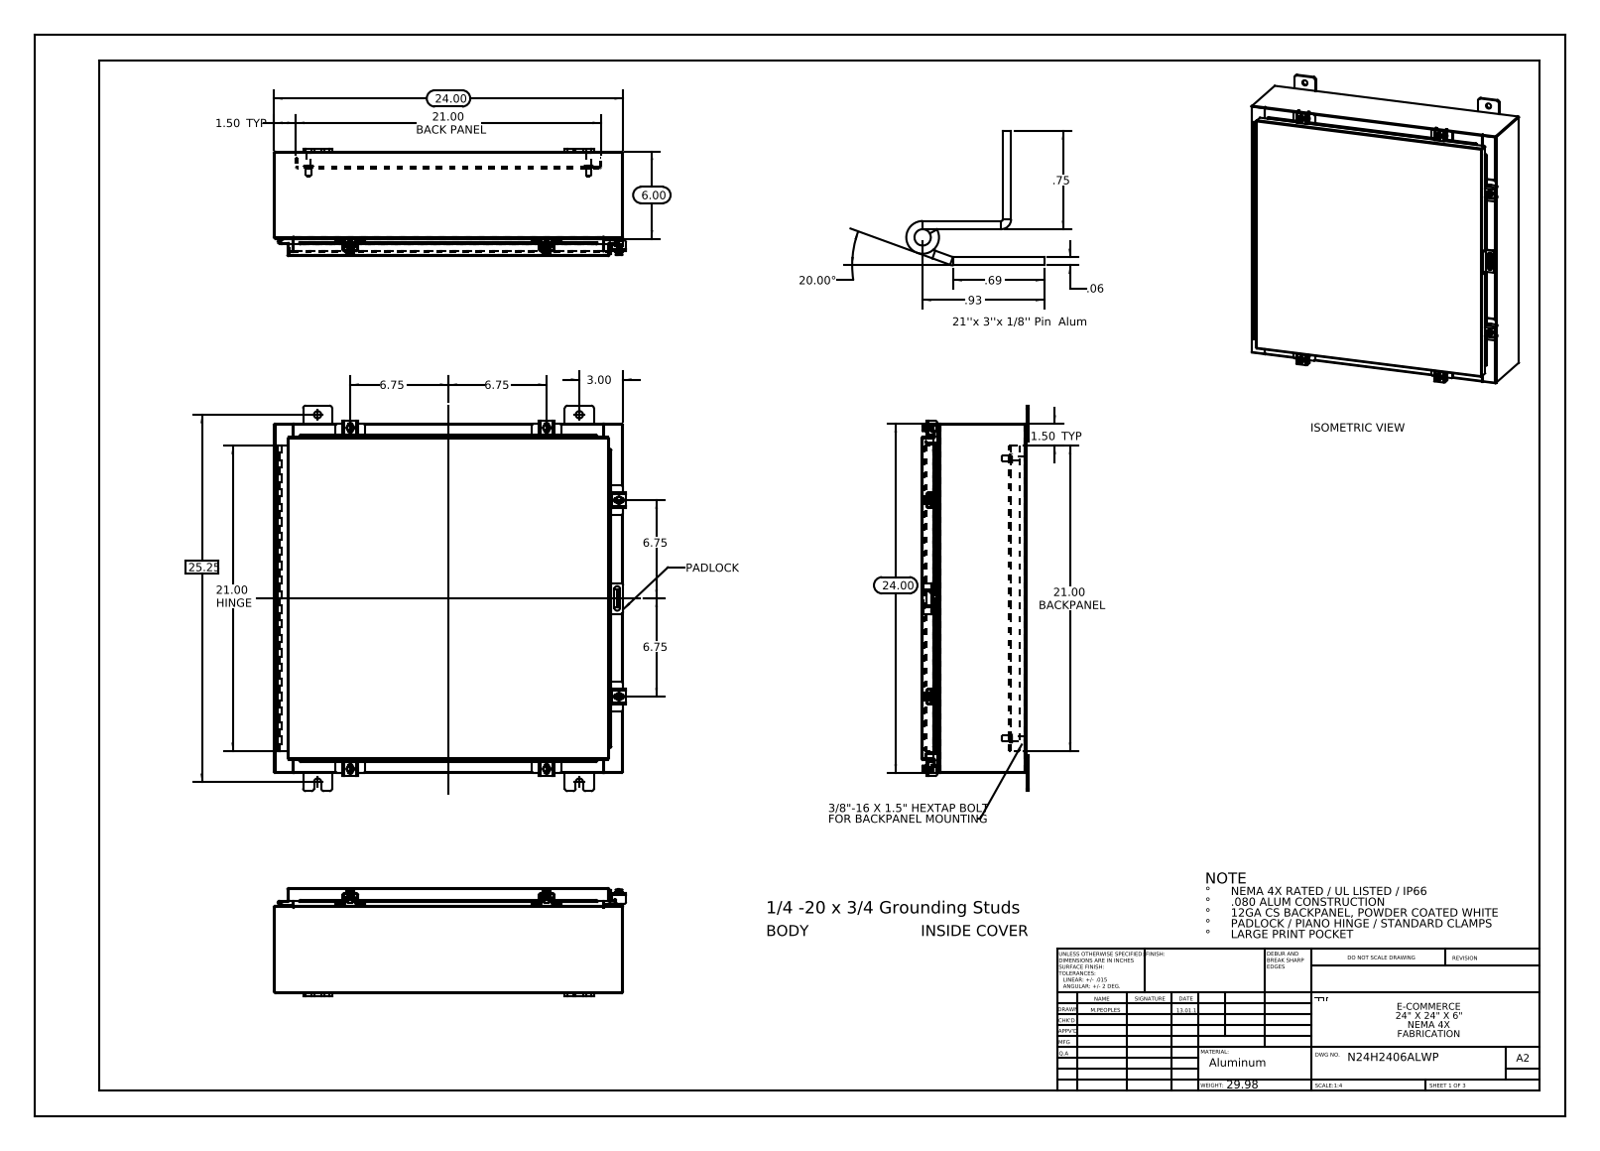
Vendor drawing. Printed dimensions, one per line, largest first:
25.25
24.00
24.00
21.00 HINGE
21.00 BACK PANEL
21.00 BACKPANEL
20.00°
6.75
6.75
6.75
6.75
6.00
3.00
1.50 TYP
1.50 TYP
.93
.75
.69
.06
